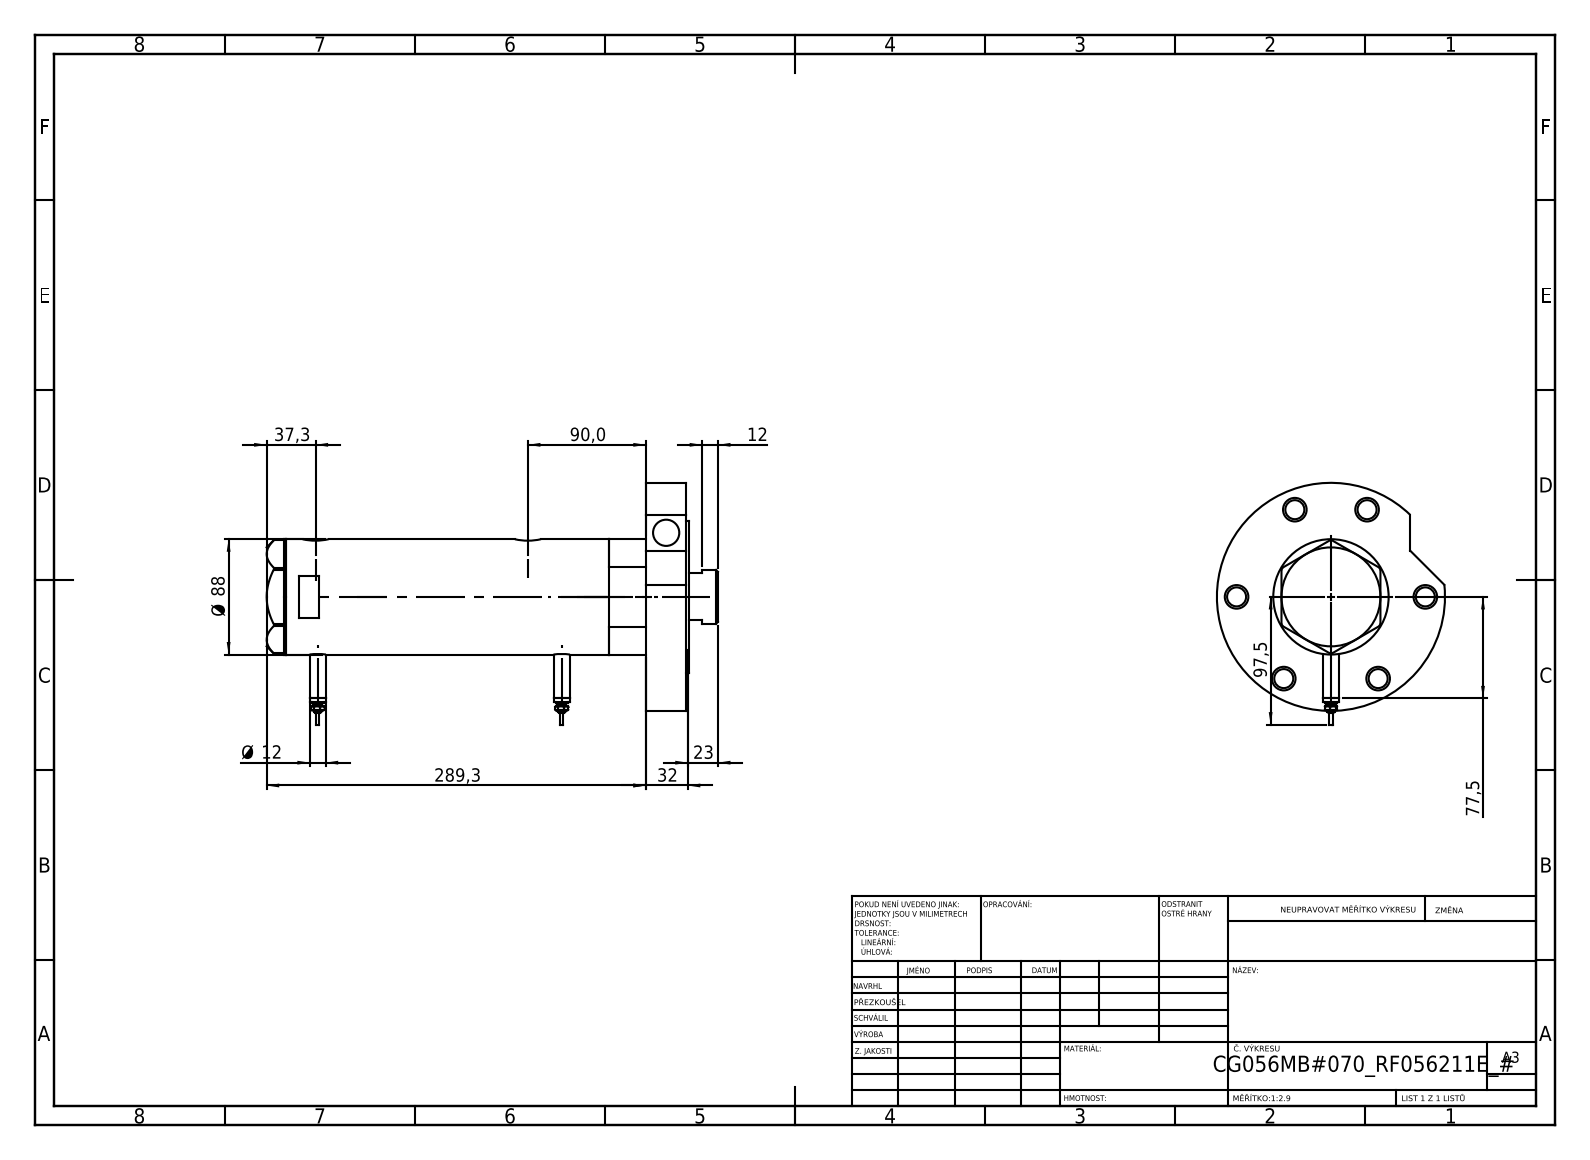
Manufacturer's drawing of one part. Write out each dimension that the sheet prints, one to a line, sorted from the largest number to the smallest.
289,3
97,5
90,0
Ø 88
77,5
37,3
32
23
12
Ø 12
